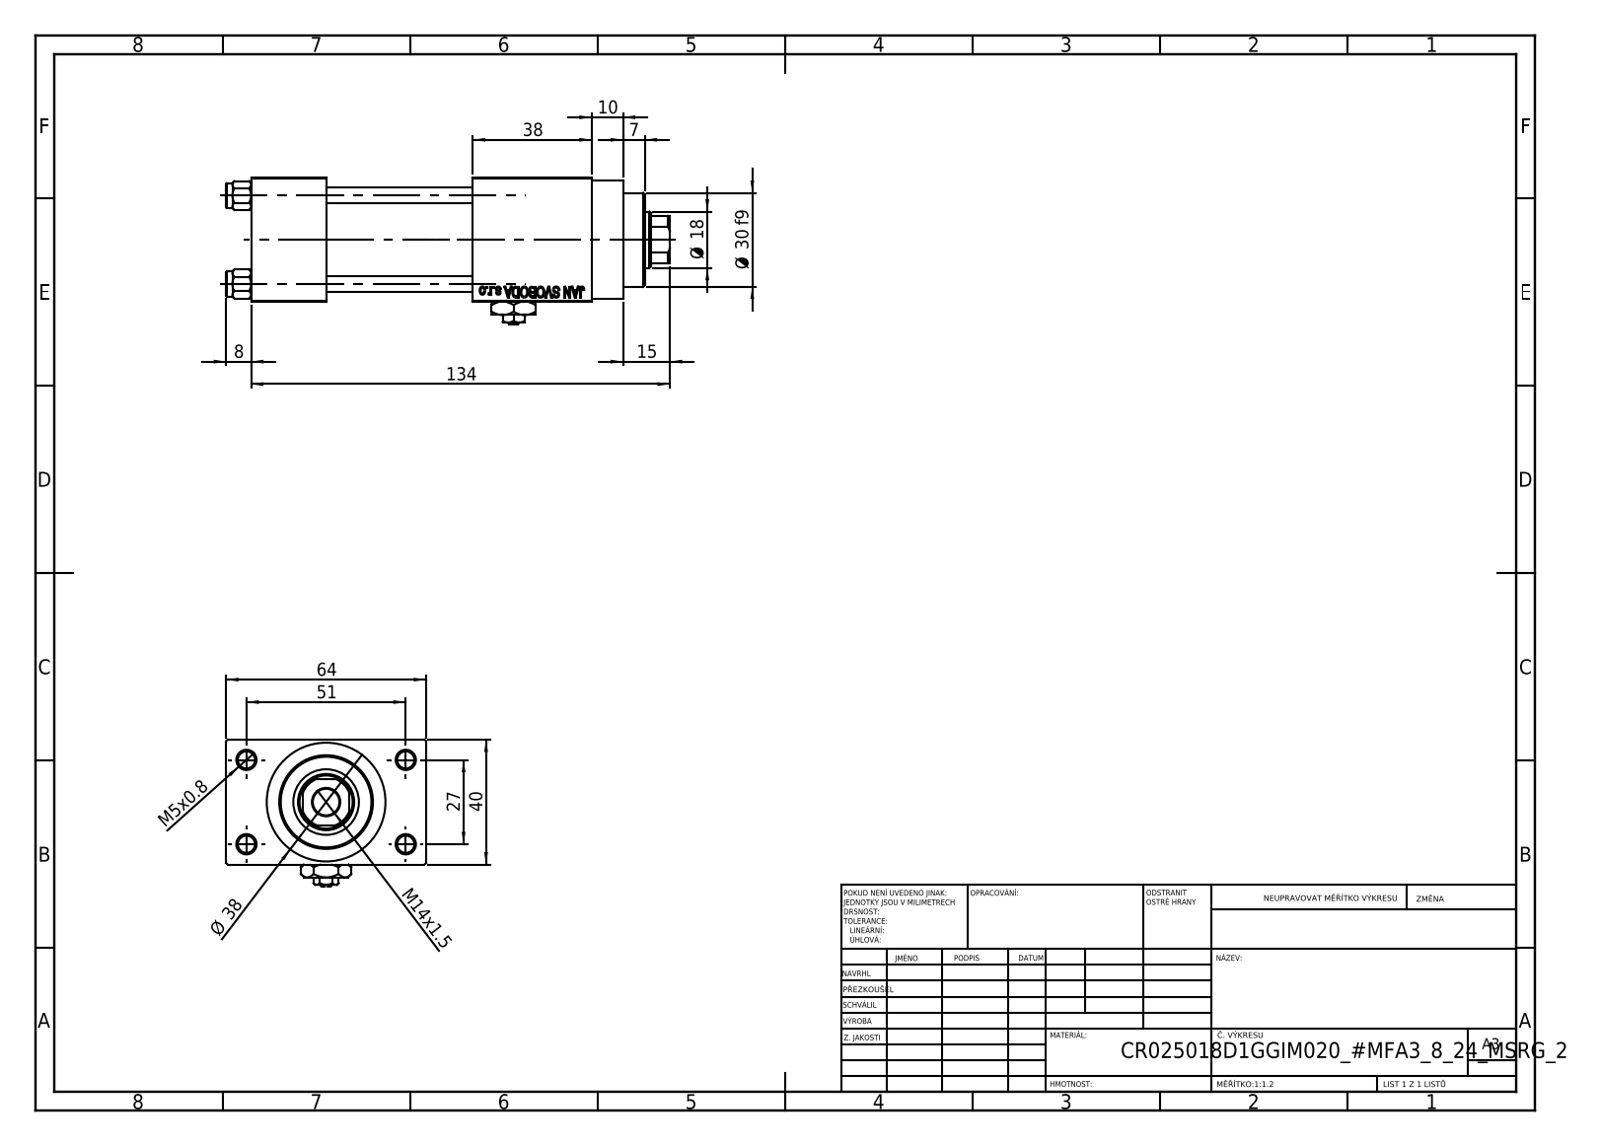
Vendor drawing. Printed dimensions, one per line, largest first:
134
64
51
40
38
Ø 38
Ø 30 f9
27
Ø 18
15
M14x1.5
10
8
7
M5x0.8
